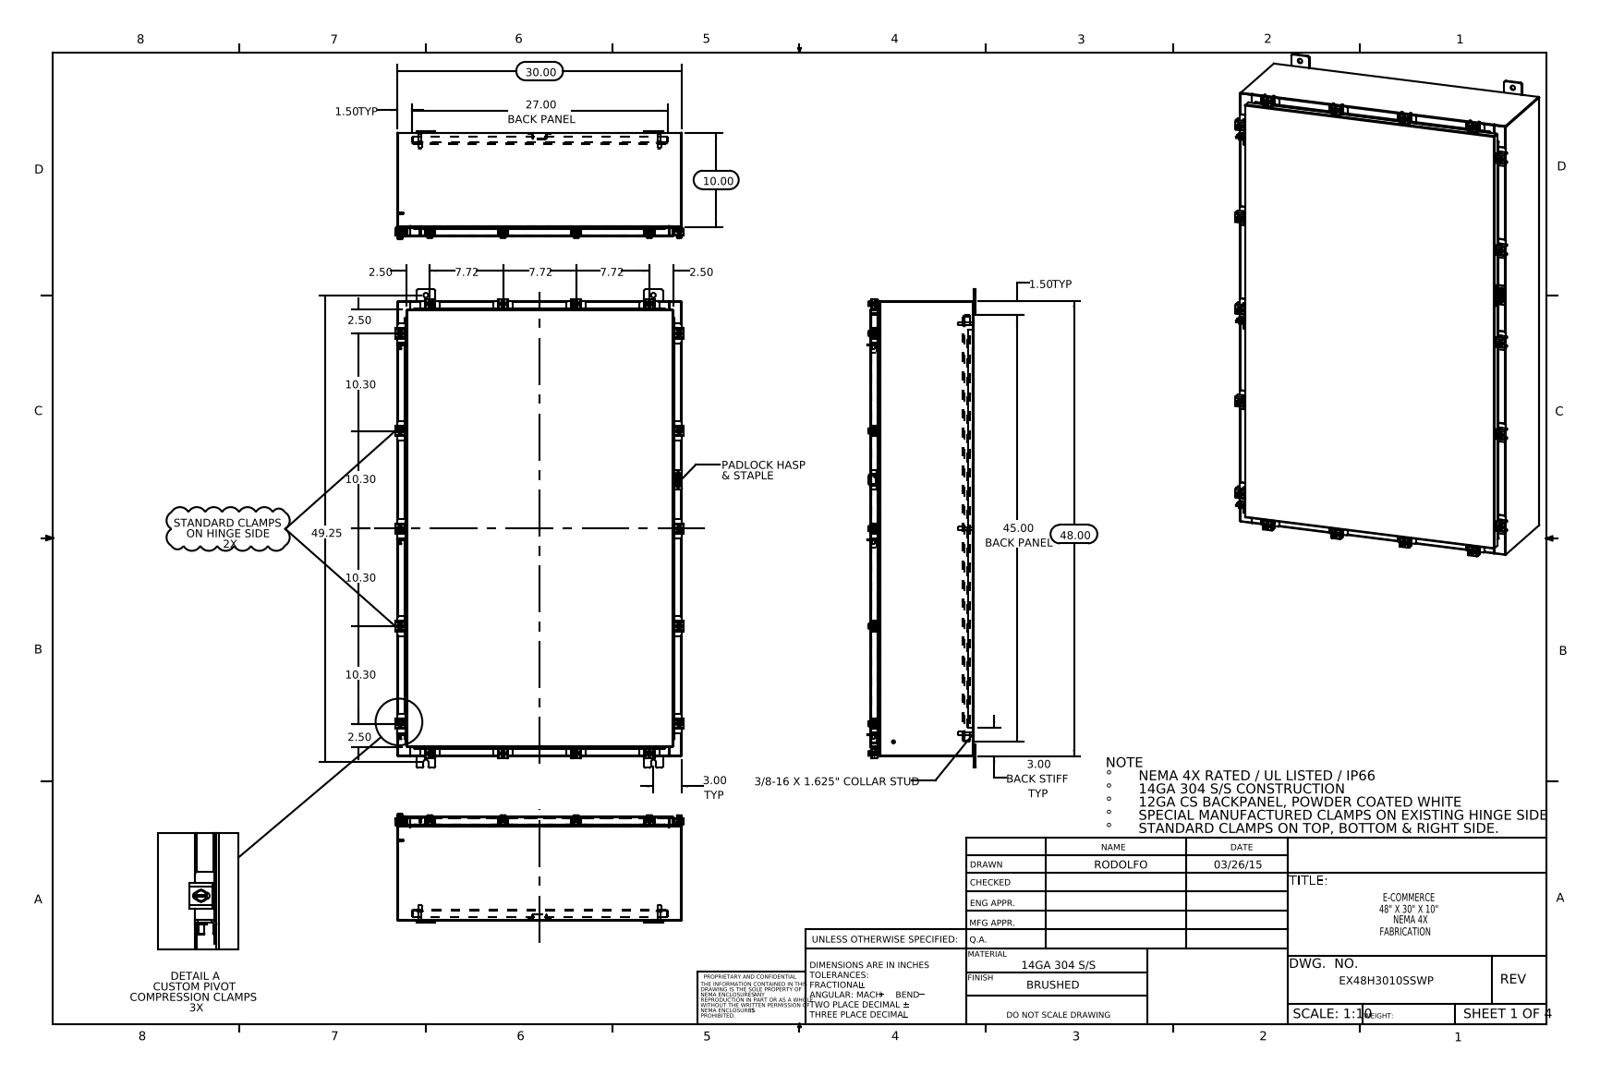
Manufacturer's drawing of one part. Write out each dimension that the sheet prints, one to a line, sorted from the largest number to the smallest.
49.25
48.00
45.00 BACK PANEL
30.00
27.00 BACK PANEL
10.30
10.30
10.30
10.30
10.00
7.72
7.72
7.72
3.00 TYP
3.00 BACK STIFF TYP
2.50
2.50
2.50
2.50
1.50 TYP
1.50 TYP
